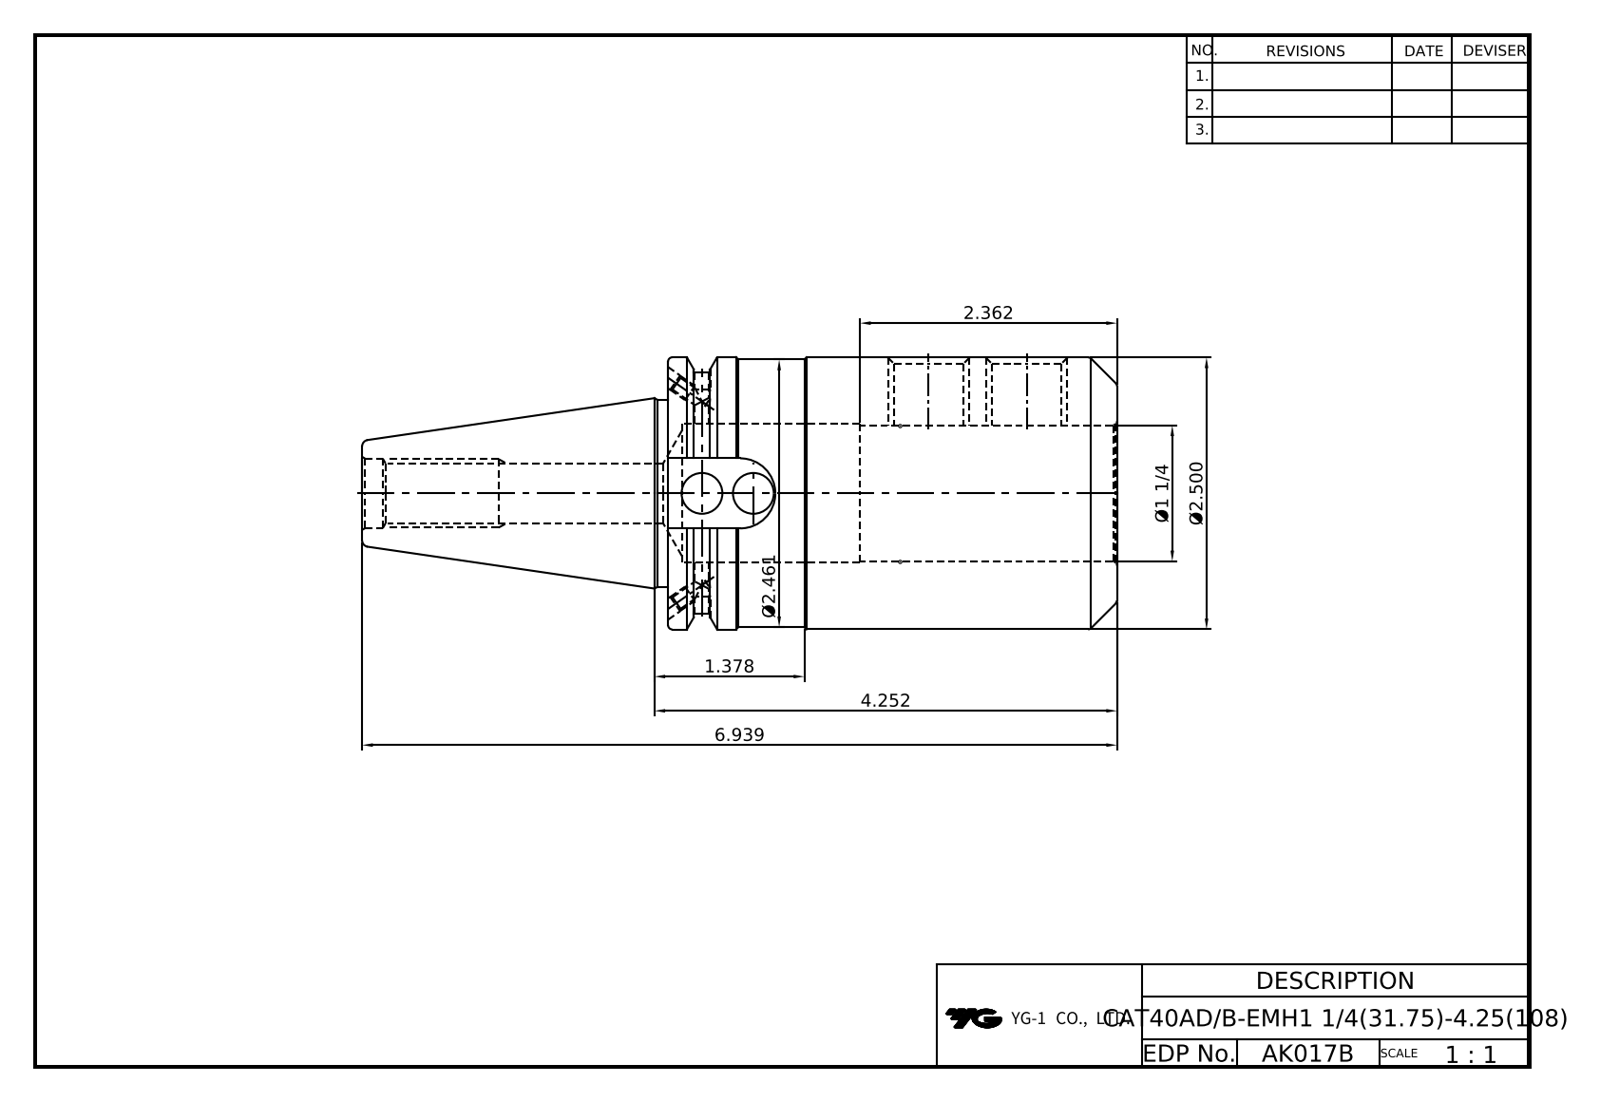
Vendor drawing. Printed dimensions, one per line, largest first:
6.939
4.252
Ø2.500
Ø2.461
2.362
1.378
Ø1 1/4
